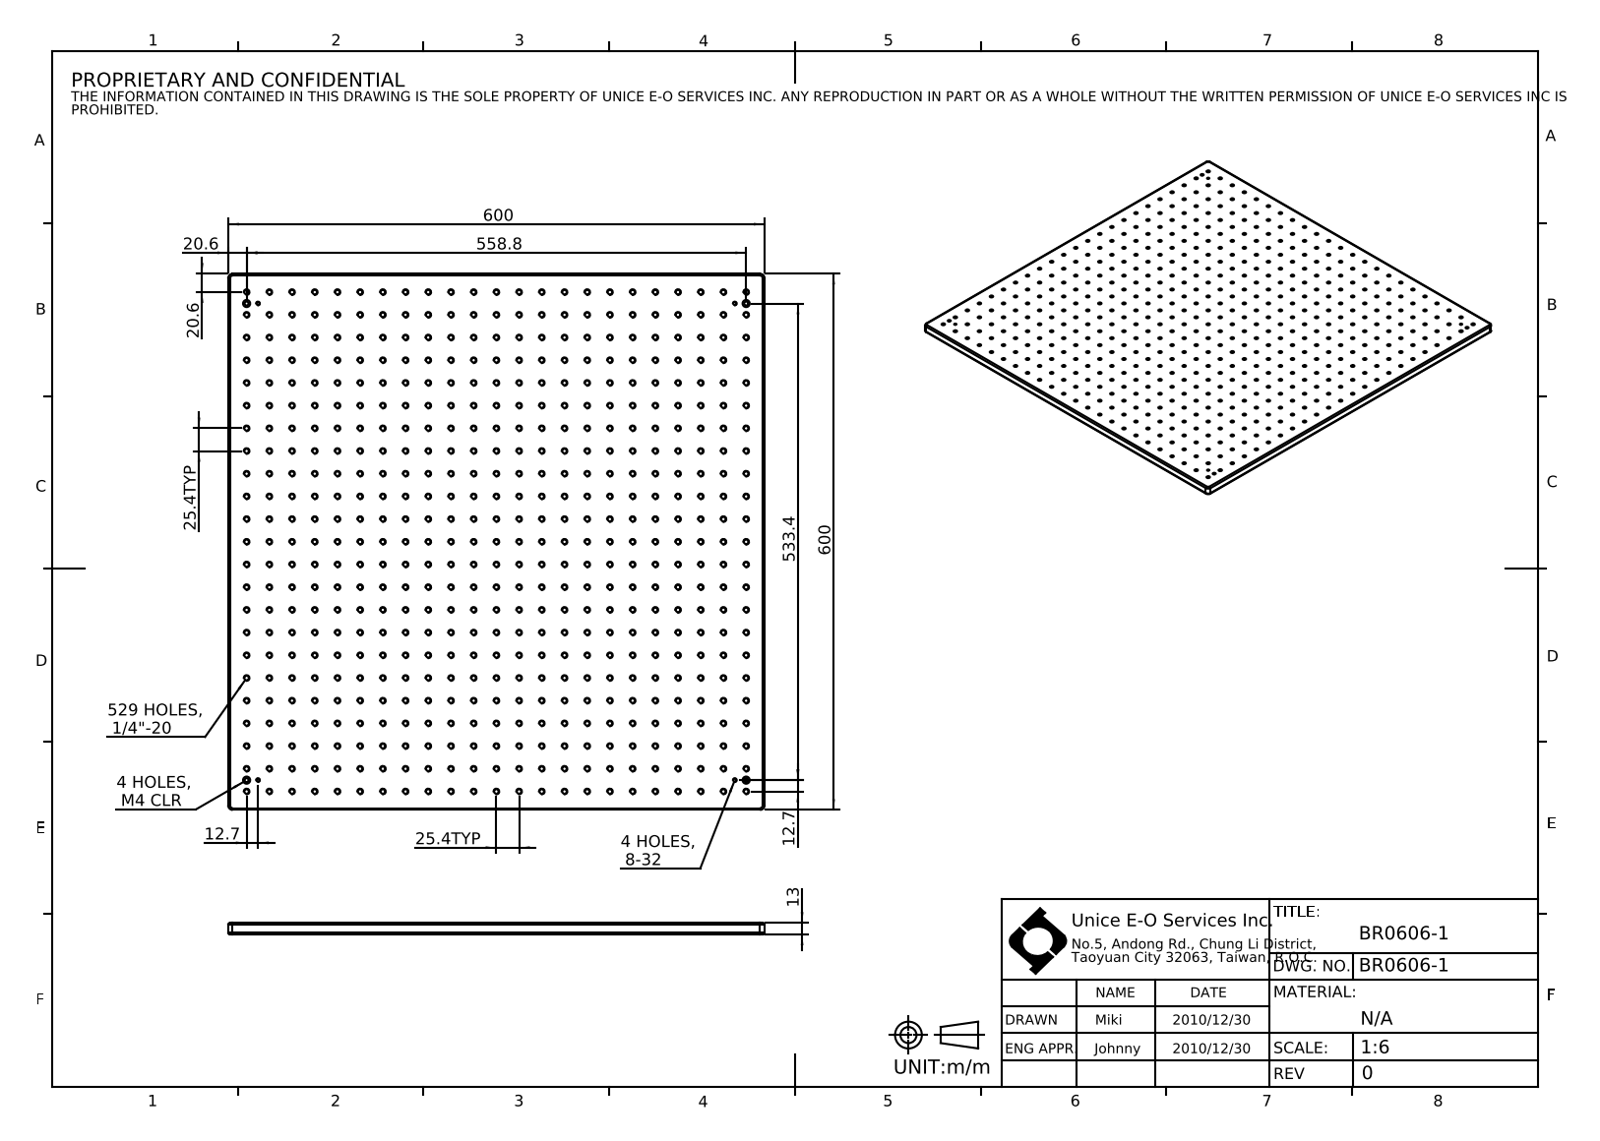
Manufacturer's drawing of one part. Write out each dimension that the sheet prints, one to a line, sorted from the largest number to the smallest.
600
600
558.8
533.4
529 HOLES, 1/4"-20
25.4 TYP
25.4 TYP
20.6
20.6
13
12.7
12.7
4 HOLES, 8-32
4 HOLES, M4 CLR
